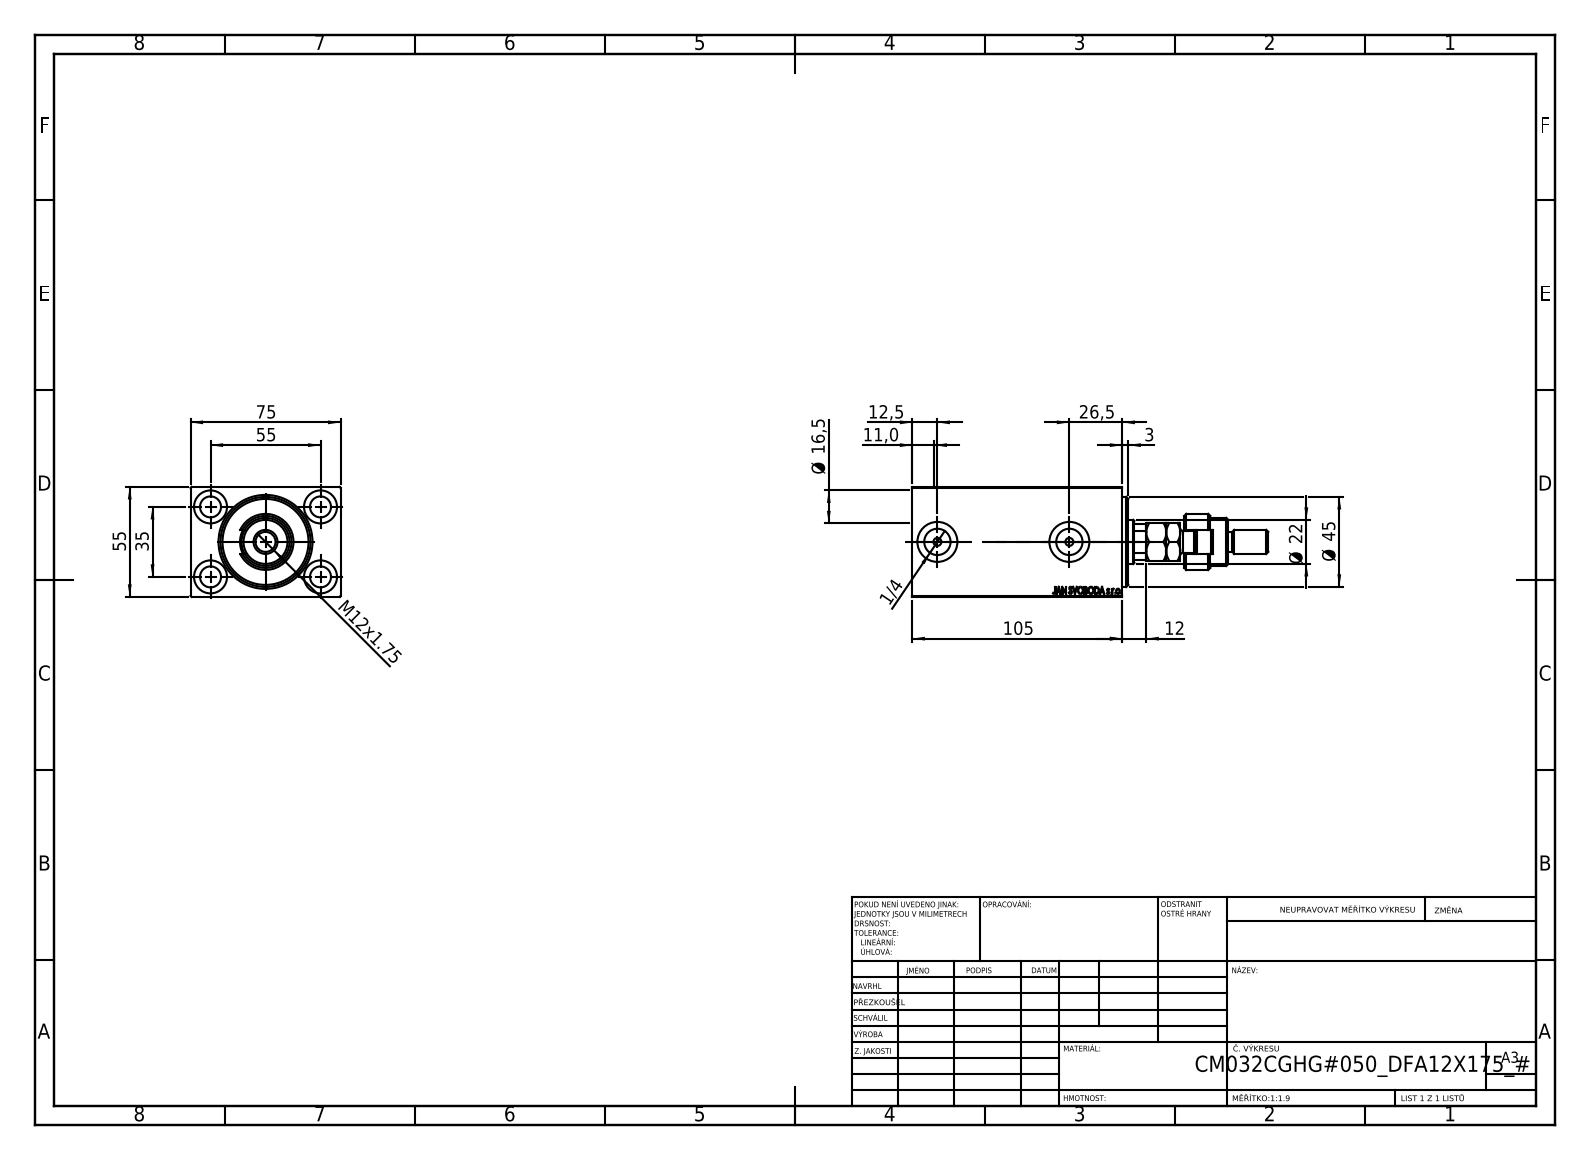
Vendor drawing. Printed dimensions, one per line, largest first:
105
75
55
55
Ø 45
35
26,5
Ø 22
Ø 16,5
12,5
M12x1.75
12
11,0
3
1/4
